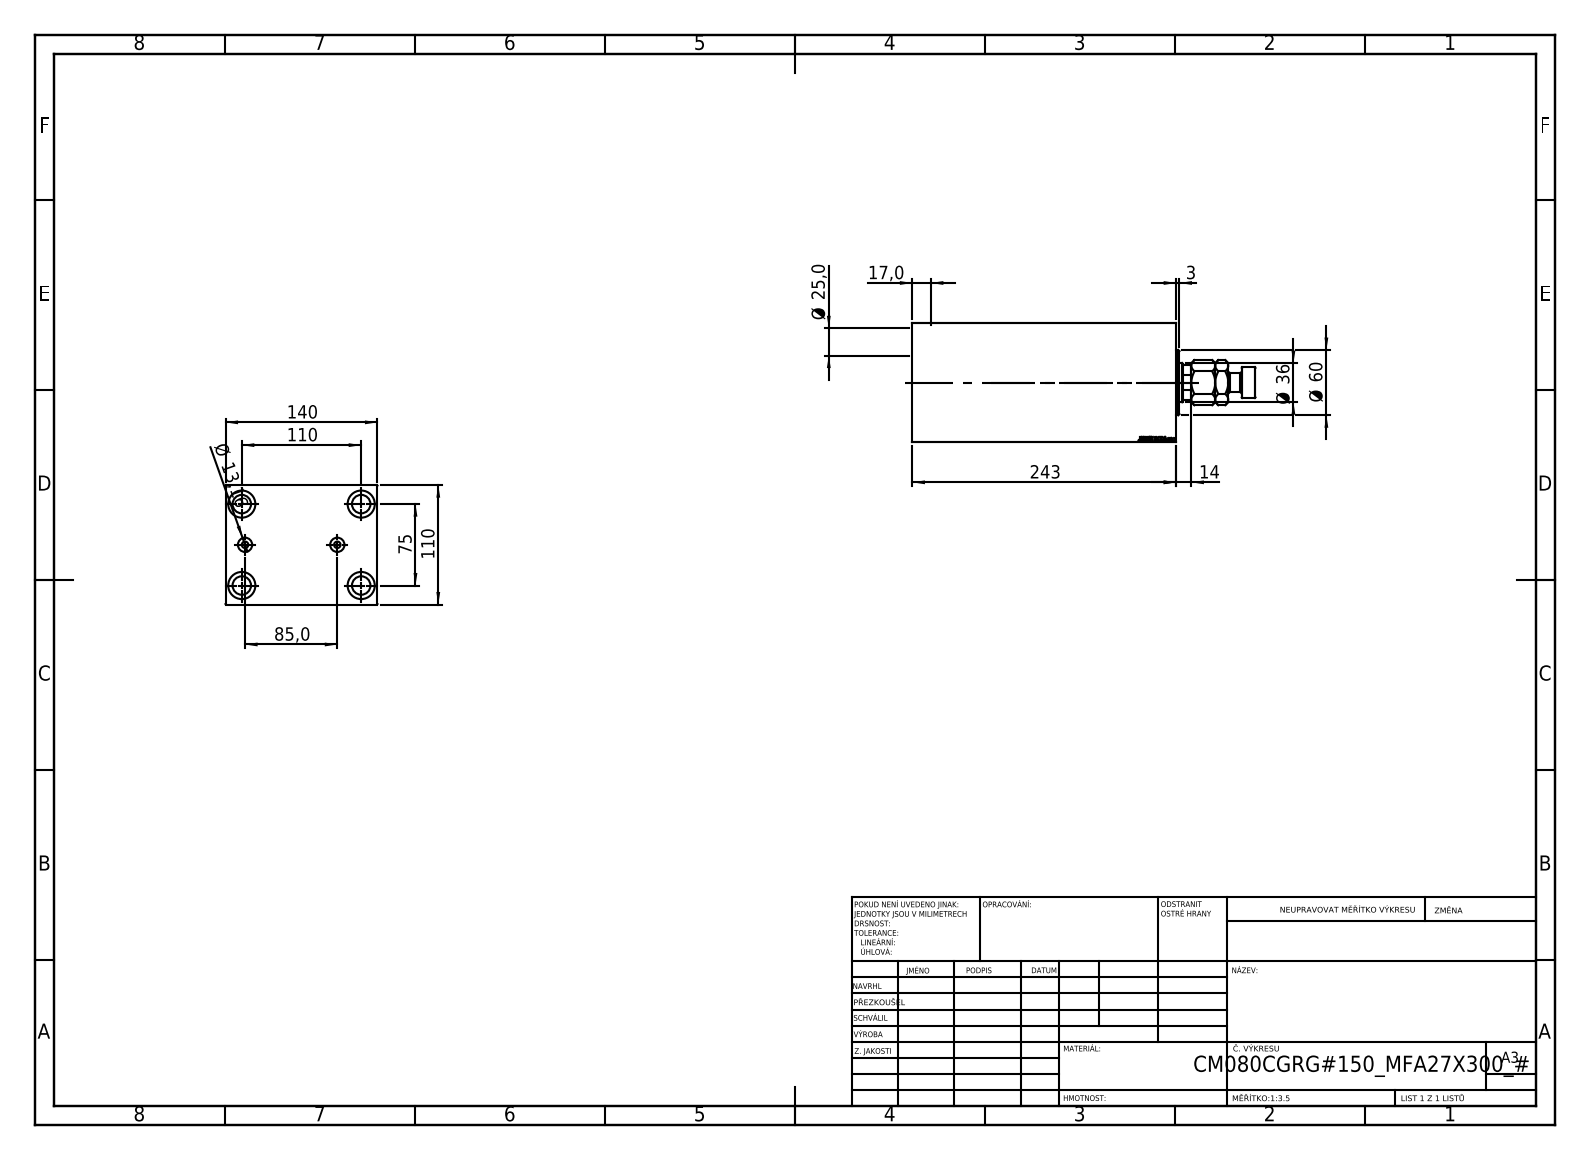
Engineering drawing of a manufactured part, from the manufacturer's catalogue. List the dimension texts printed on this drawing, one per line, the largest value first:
243
140
110
110
85,0
75
Ø 60
Ø 36
Ø 25,0
17,0
14
Ø 13,16
3
